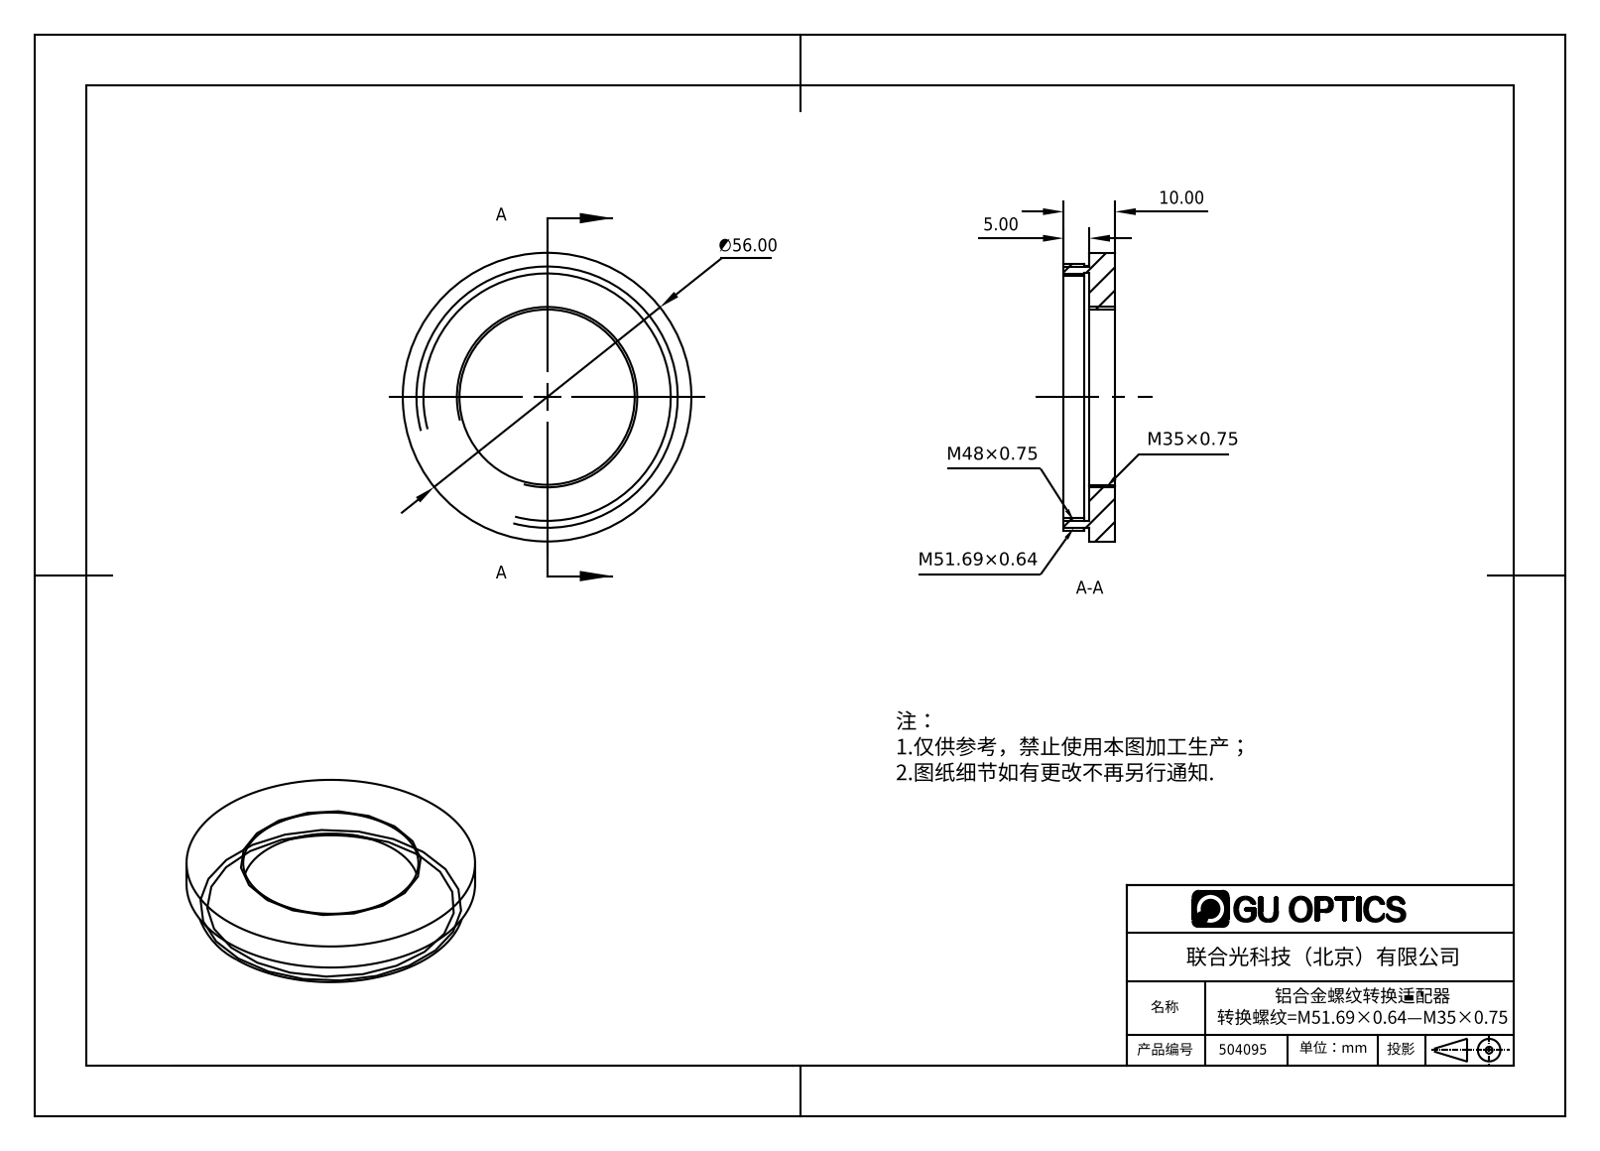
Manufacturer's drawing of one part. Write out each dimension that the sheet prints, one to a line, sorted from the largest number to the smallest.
∅56.00
10.00
5.00
